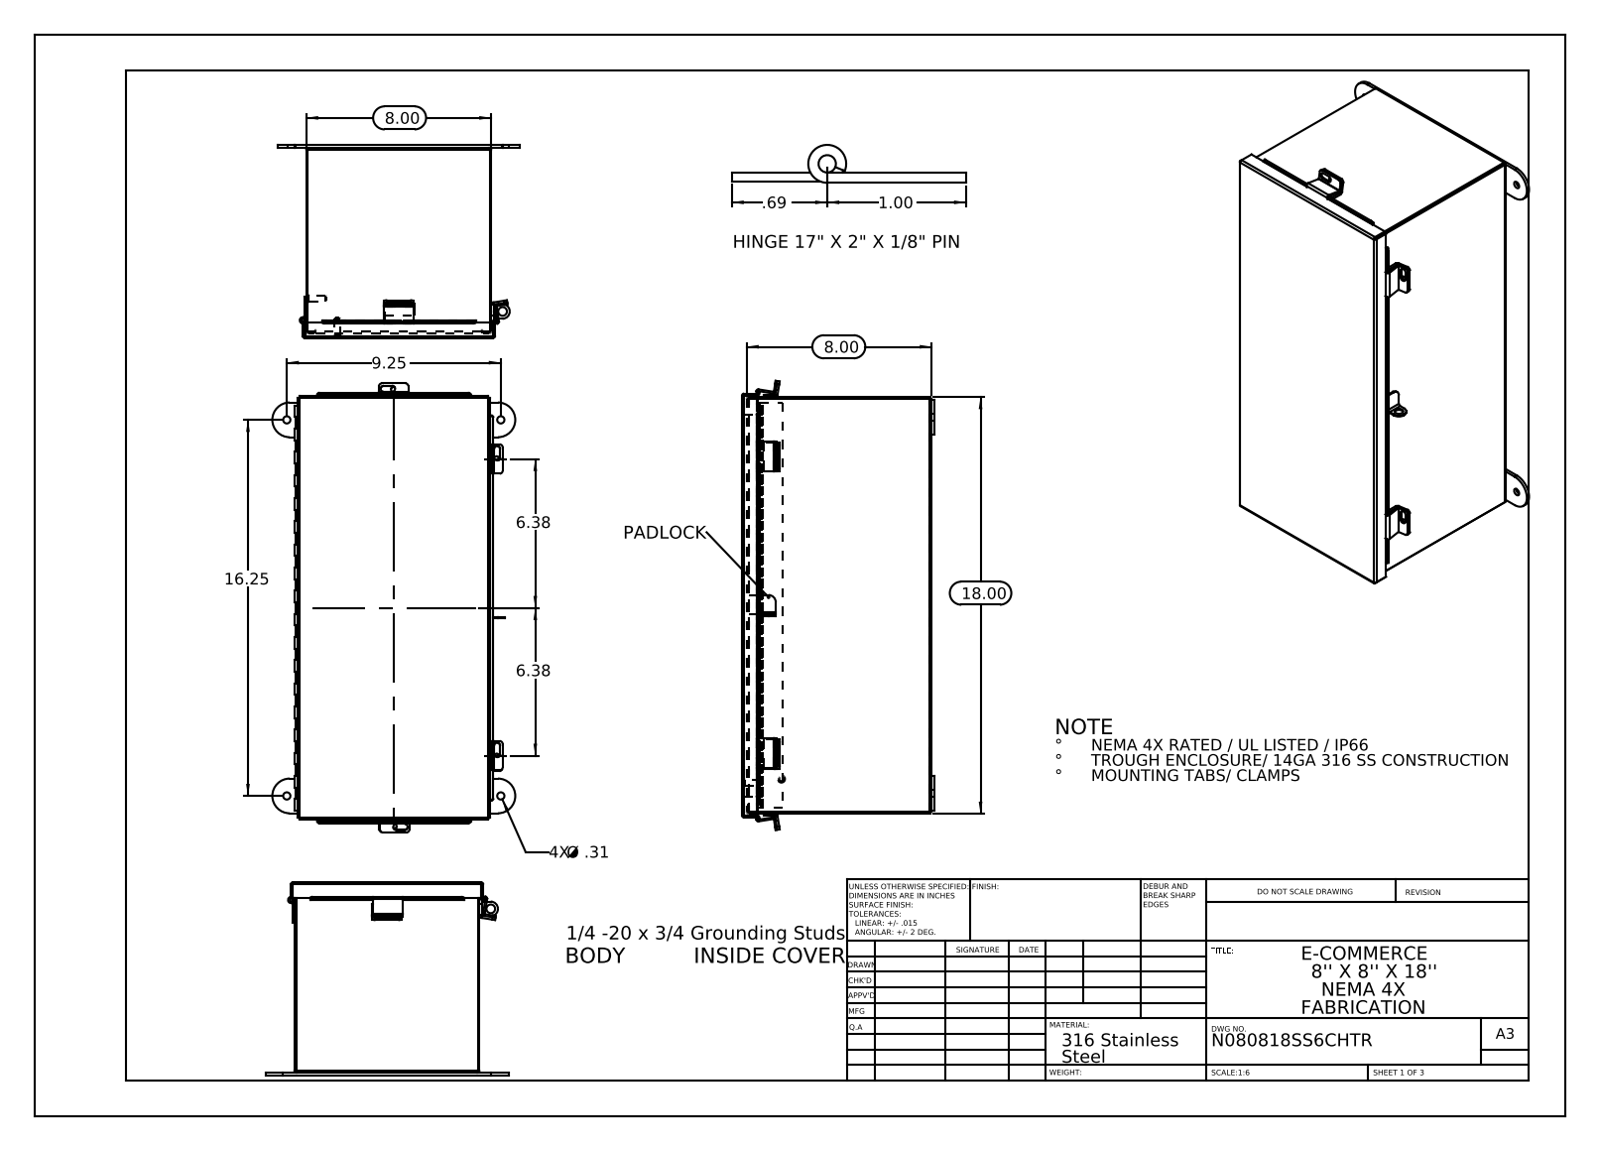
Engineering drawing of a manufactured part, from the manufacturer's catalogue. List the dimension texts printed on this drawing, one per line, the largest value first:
18.00
16.25
9.25
8.00
8.00
6.38
6.38
1.00
.69
4X Ø .31
